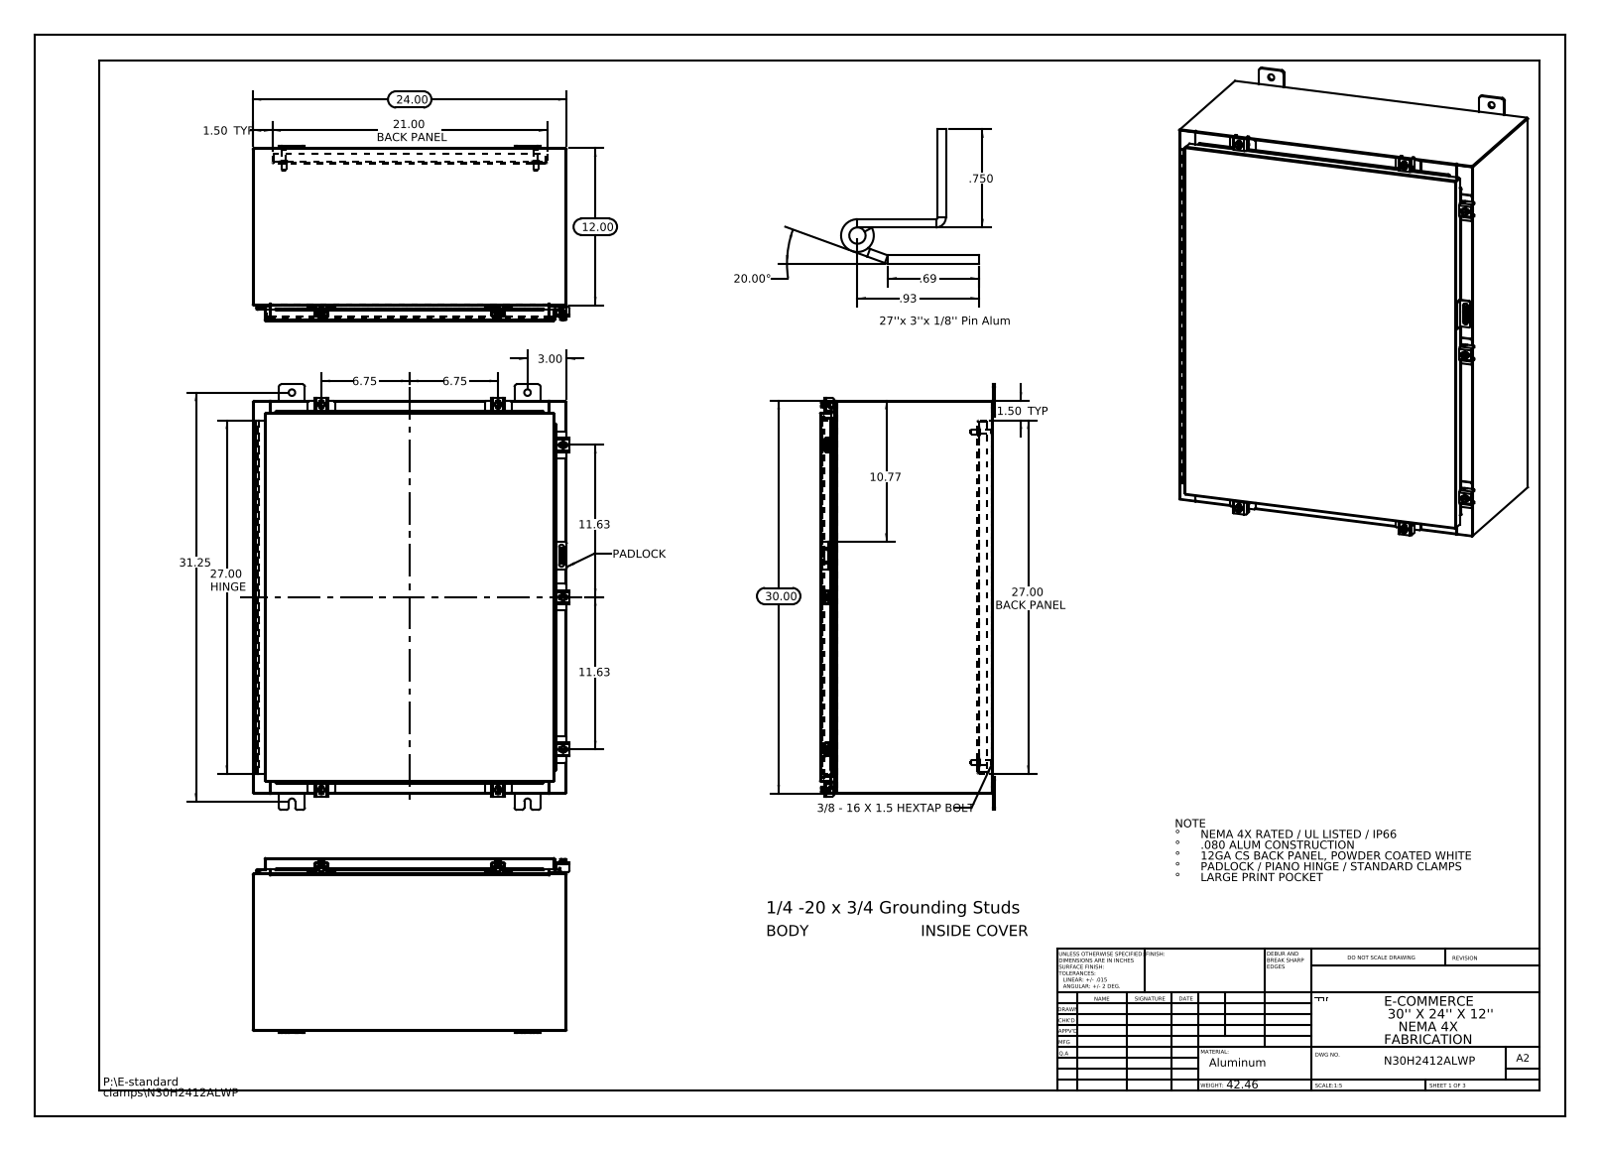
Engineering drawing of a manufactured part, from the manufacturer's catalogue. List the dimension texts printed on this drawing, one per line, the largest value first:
31.25
30.00
27.00 HINGE
27.00 BACK PANEL
24.00
21.00 BACK PANEL
20.00°
12.00
11.63
11.63
10.77
6.75
6.75
3.00
1.50 TYP
1.50 TYP
.93
.750
.69
